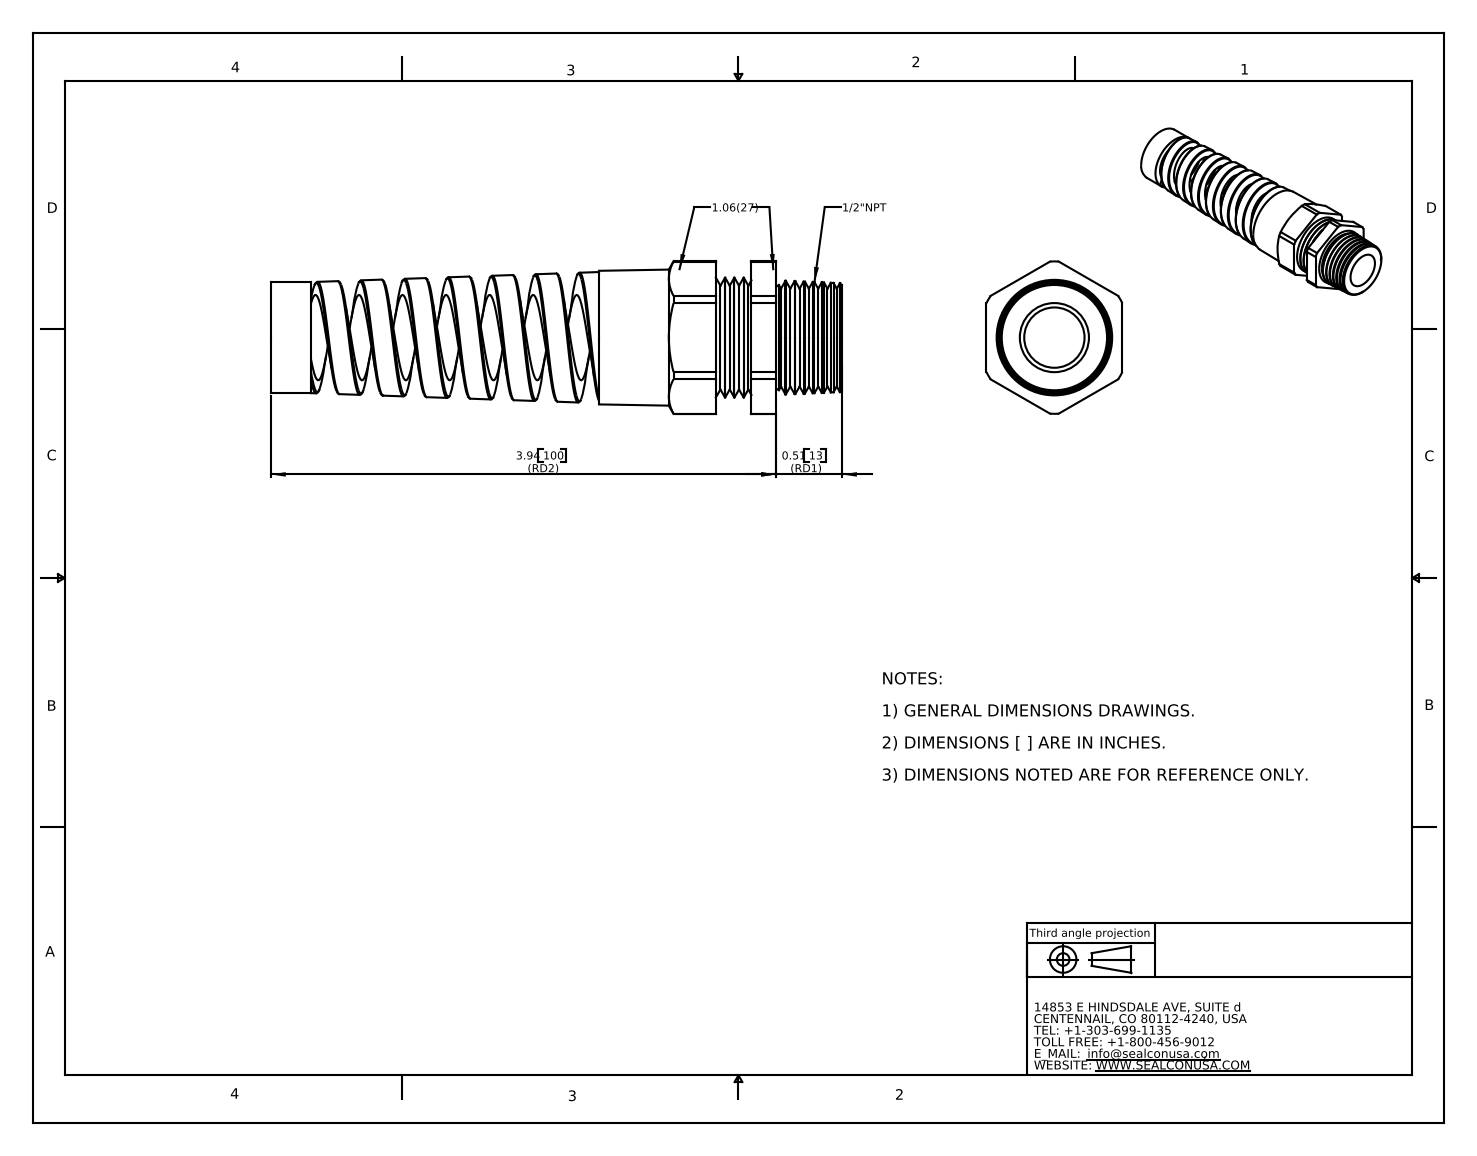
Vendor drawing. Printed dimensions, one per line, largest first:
3.94 100 (RD2)
0.51 13 (RD1)
